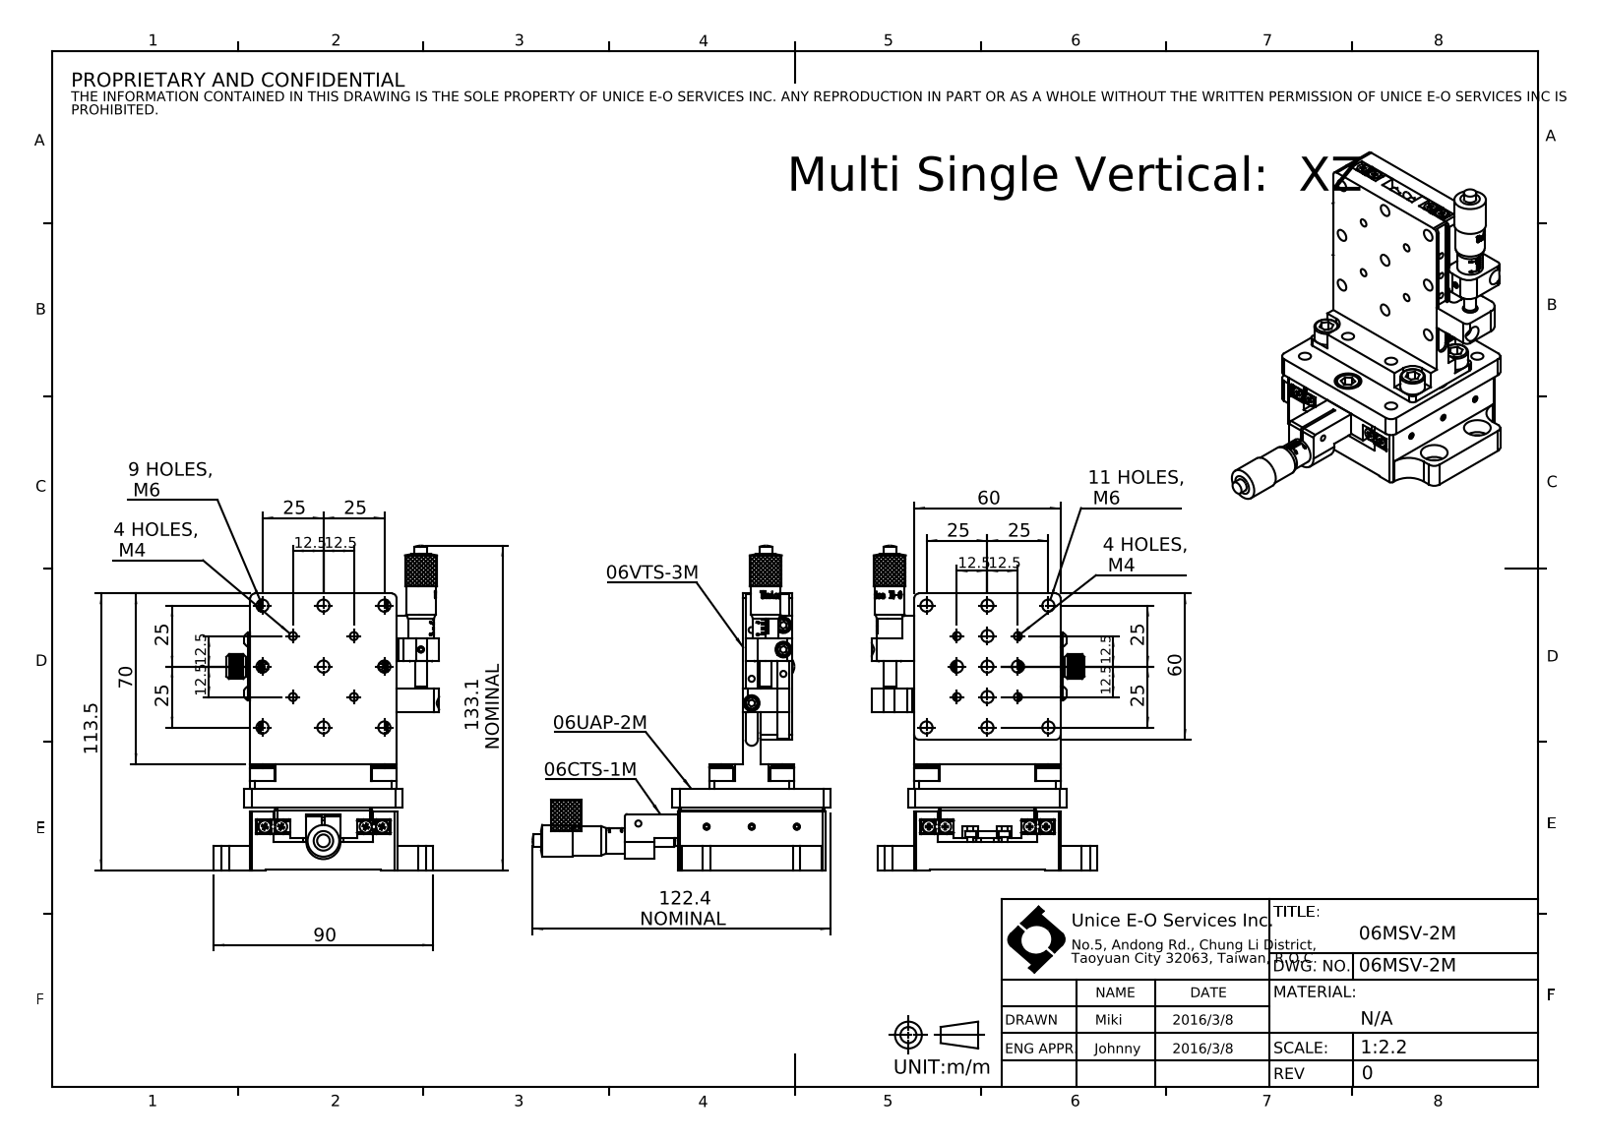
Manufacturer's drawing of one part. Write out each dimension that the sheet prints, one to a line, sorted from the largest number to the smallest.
133.1 NOMINAL
122.4 NOMINAL
113.5
90
70
60
60
25
25
25
25
25
25
25
25
12.5
12.5
12.5
12.5
12.5
12.5
12.5
12.5
11 HOLES, M6
9 HOLES, M6
4 HOLES, M4
4 HOLES, M4
